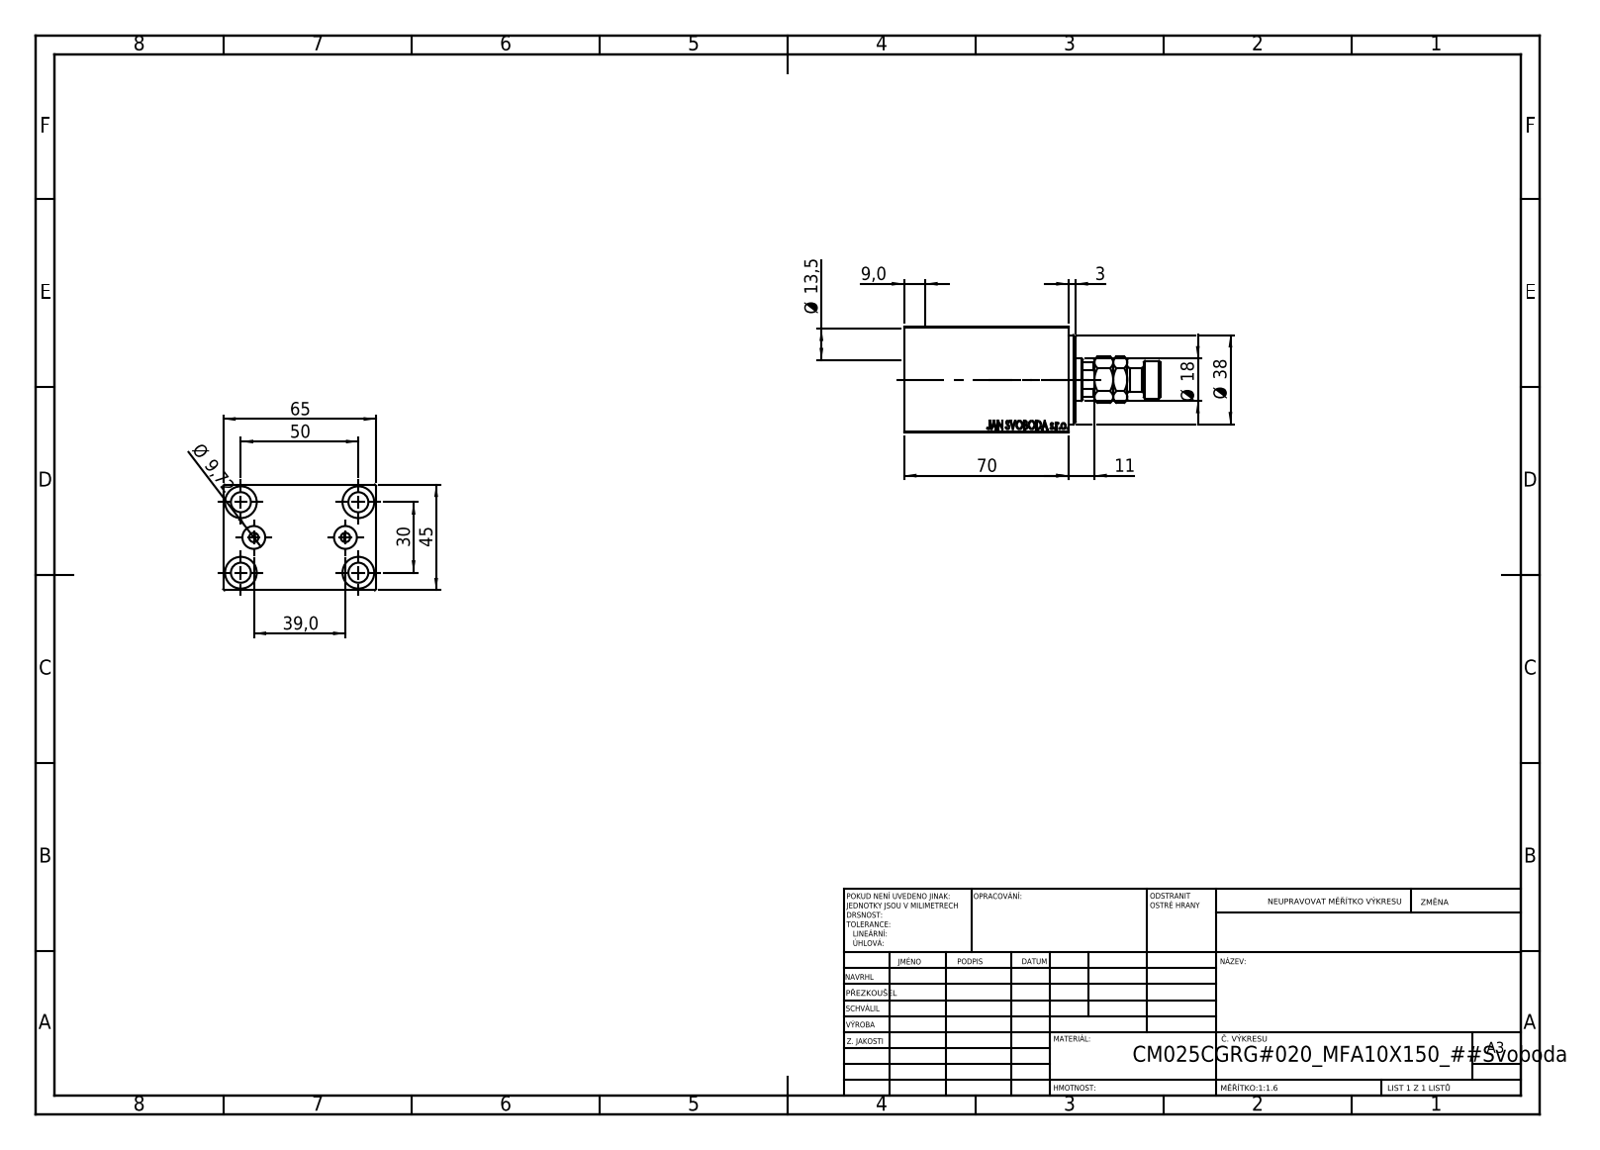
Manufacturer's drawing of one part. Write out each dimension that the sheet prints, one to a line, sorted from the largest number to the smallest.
70
65
50
45
39,0
Ø 38
30
Ø 18
Ø 13,5
11
Ø 9,72
9,0
3
